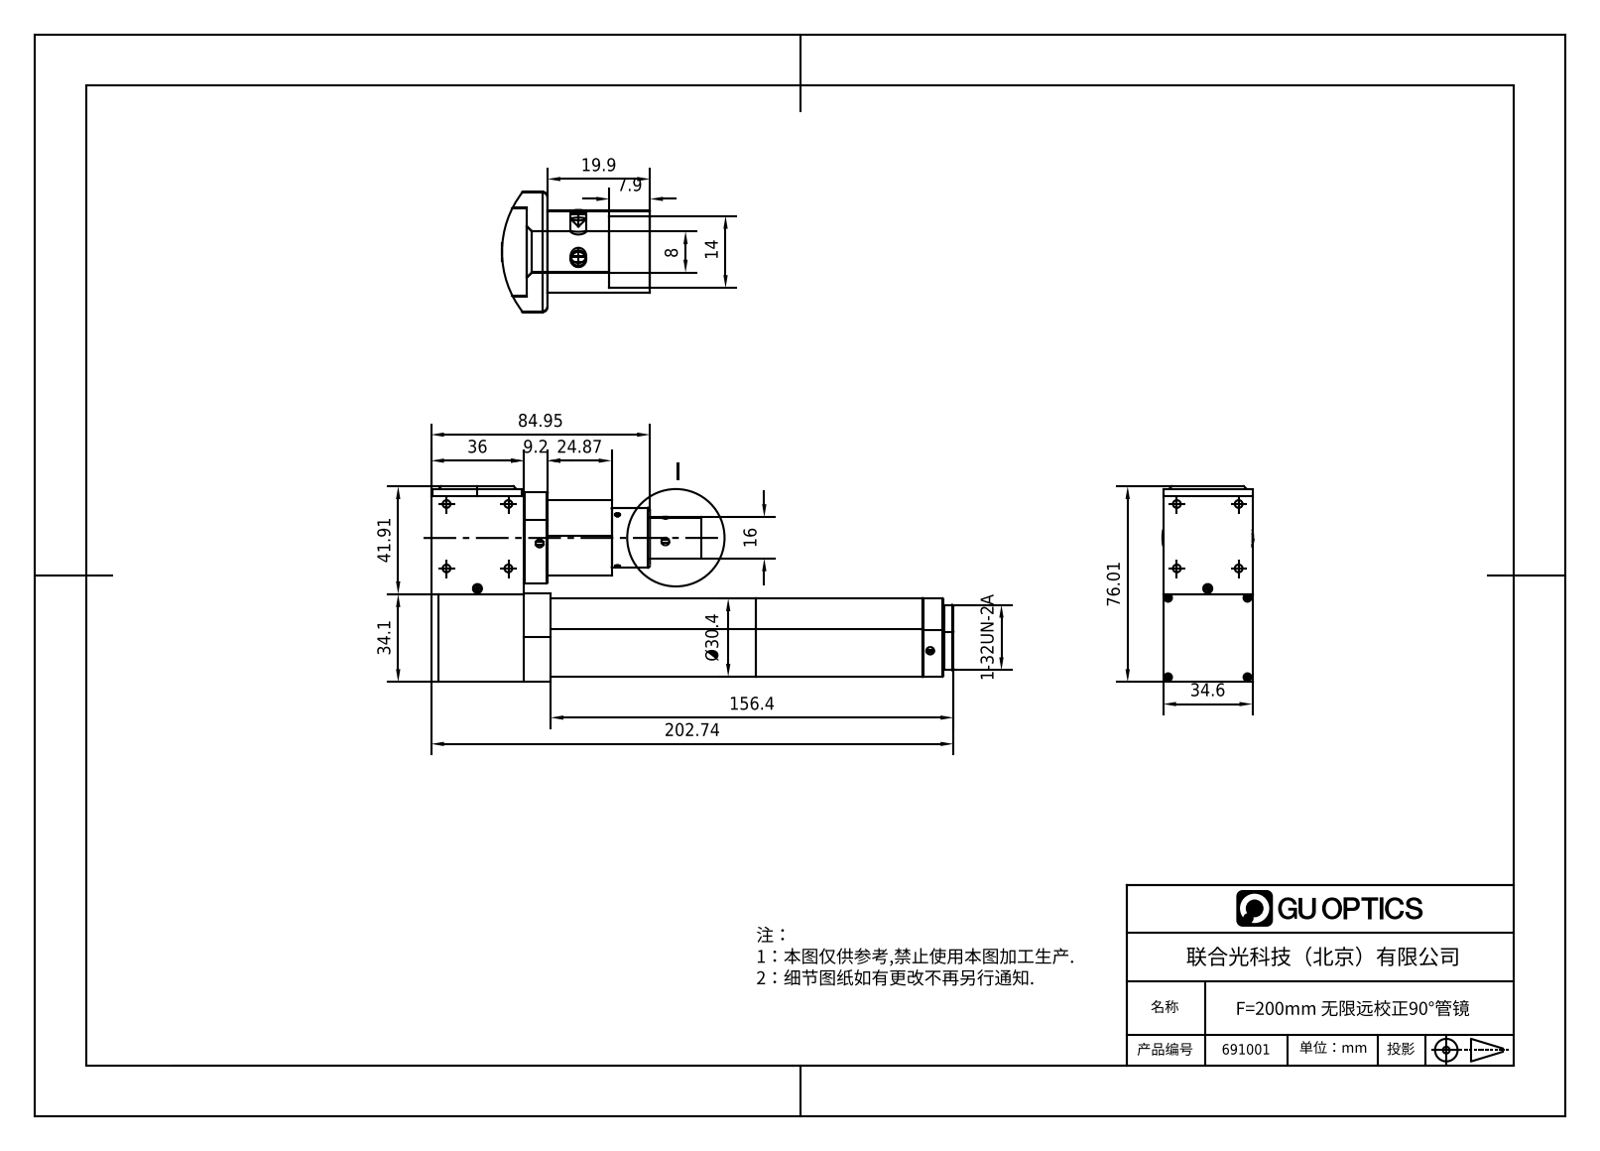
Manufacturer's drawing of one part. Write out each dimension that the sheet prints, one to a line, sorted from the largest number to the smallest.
202.74
156.4
84.95
76.01
41.91
36
34.6
34.1
Ø30.4
24.87
19.9
16
14
9.2
8
7.9
1-32UN-2A
